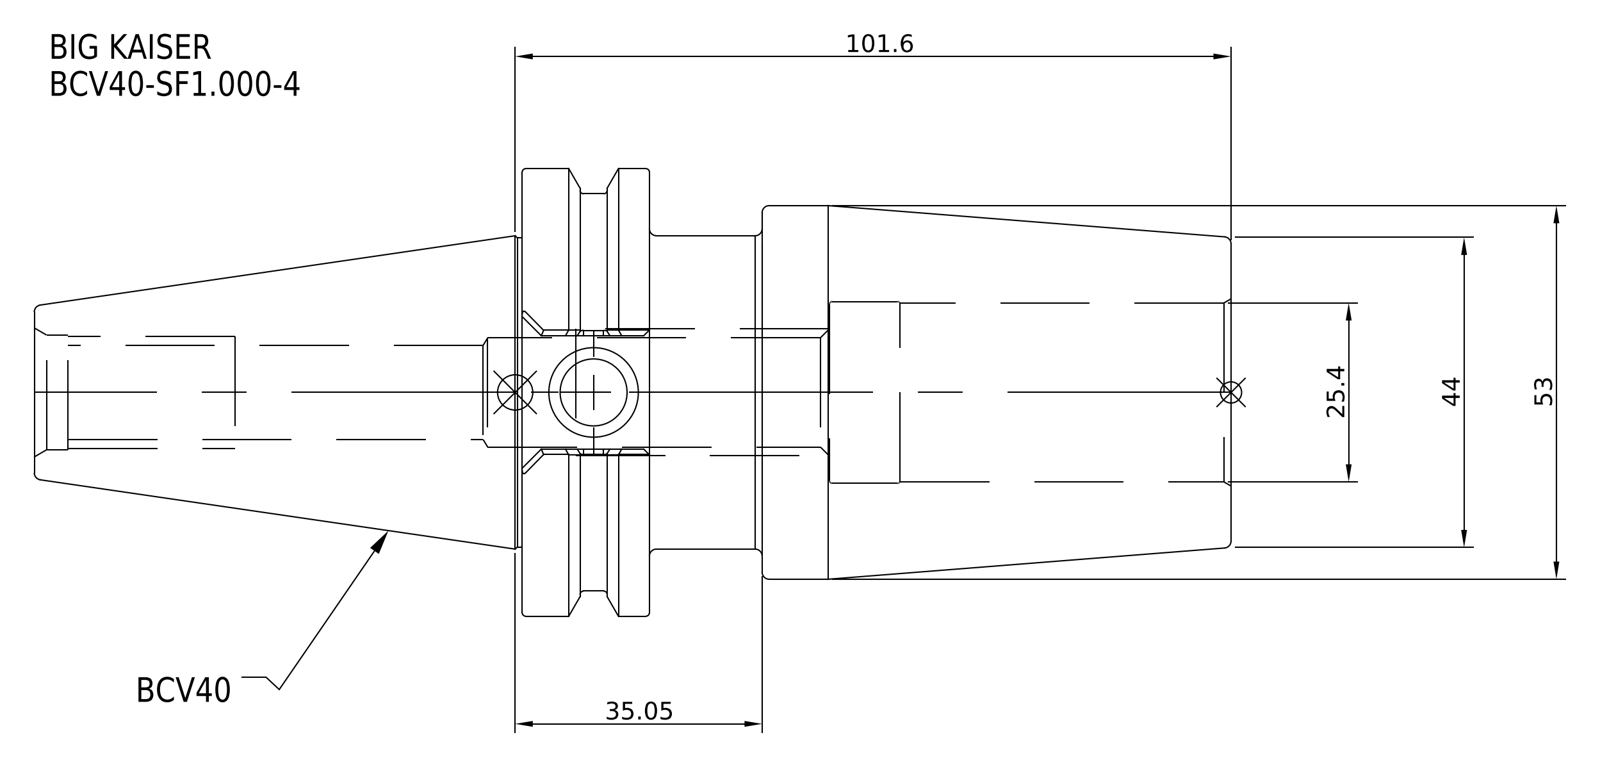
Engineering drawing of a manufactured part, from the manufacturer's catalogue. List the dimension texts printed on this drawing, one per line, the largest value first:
101.6
53
44
35.05
25.4
